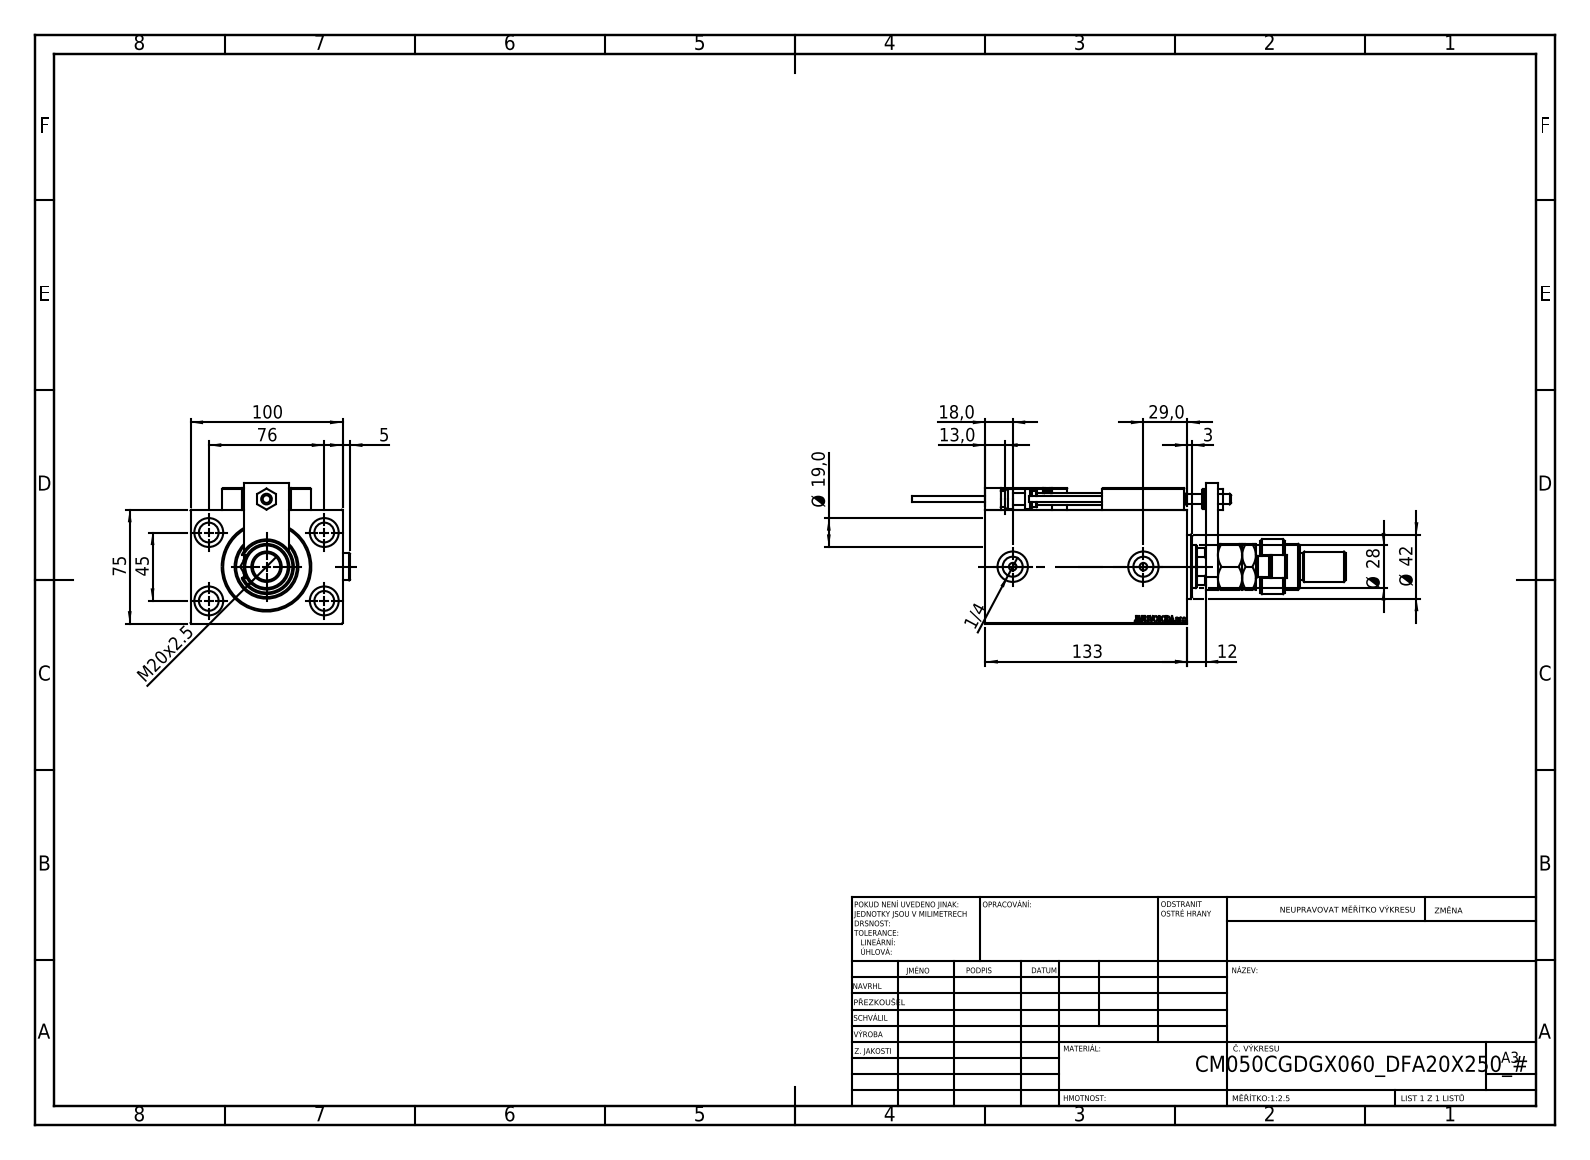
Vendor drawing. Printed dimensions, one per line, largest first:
133
100
76
75
45
Ø 42
29,0
Ø 28
M20x2.5
Ø 19,0
18,0
13,0
12
5
3
1/4
